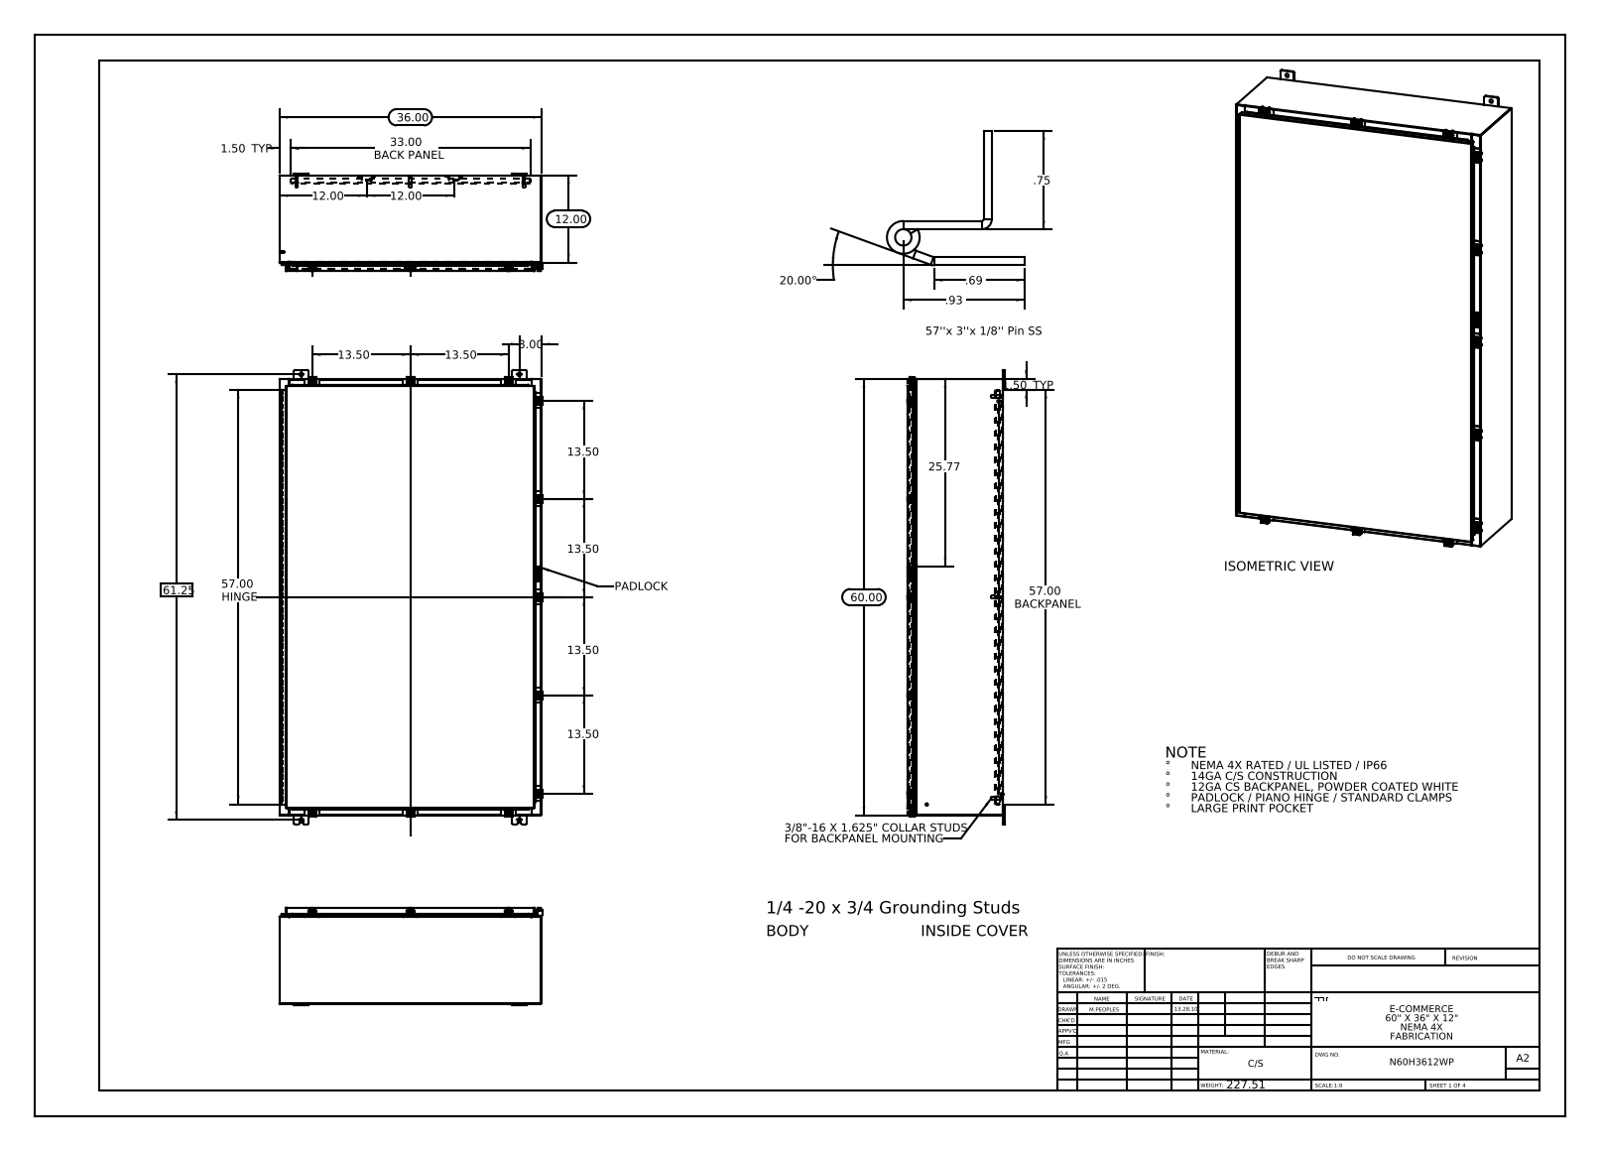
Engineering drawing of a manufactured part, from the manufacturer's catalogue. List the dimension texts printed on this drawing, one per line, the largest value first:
61.25
60.00
57.00 HINGE
57.00 BACKPANEL
36.00
33.00 BACK PANEL
25.77
20.00°
13.50
13.50
13.50
13.50
13.50
13.50
12.00
12.00
12.00
3.00
1.50 TYP
1.50 TYP
.93
.75
.69
